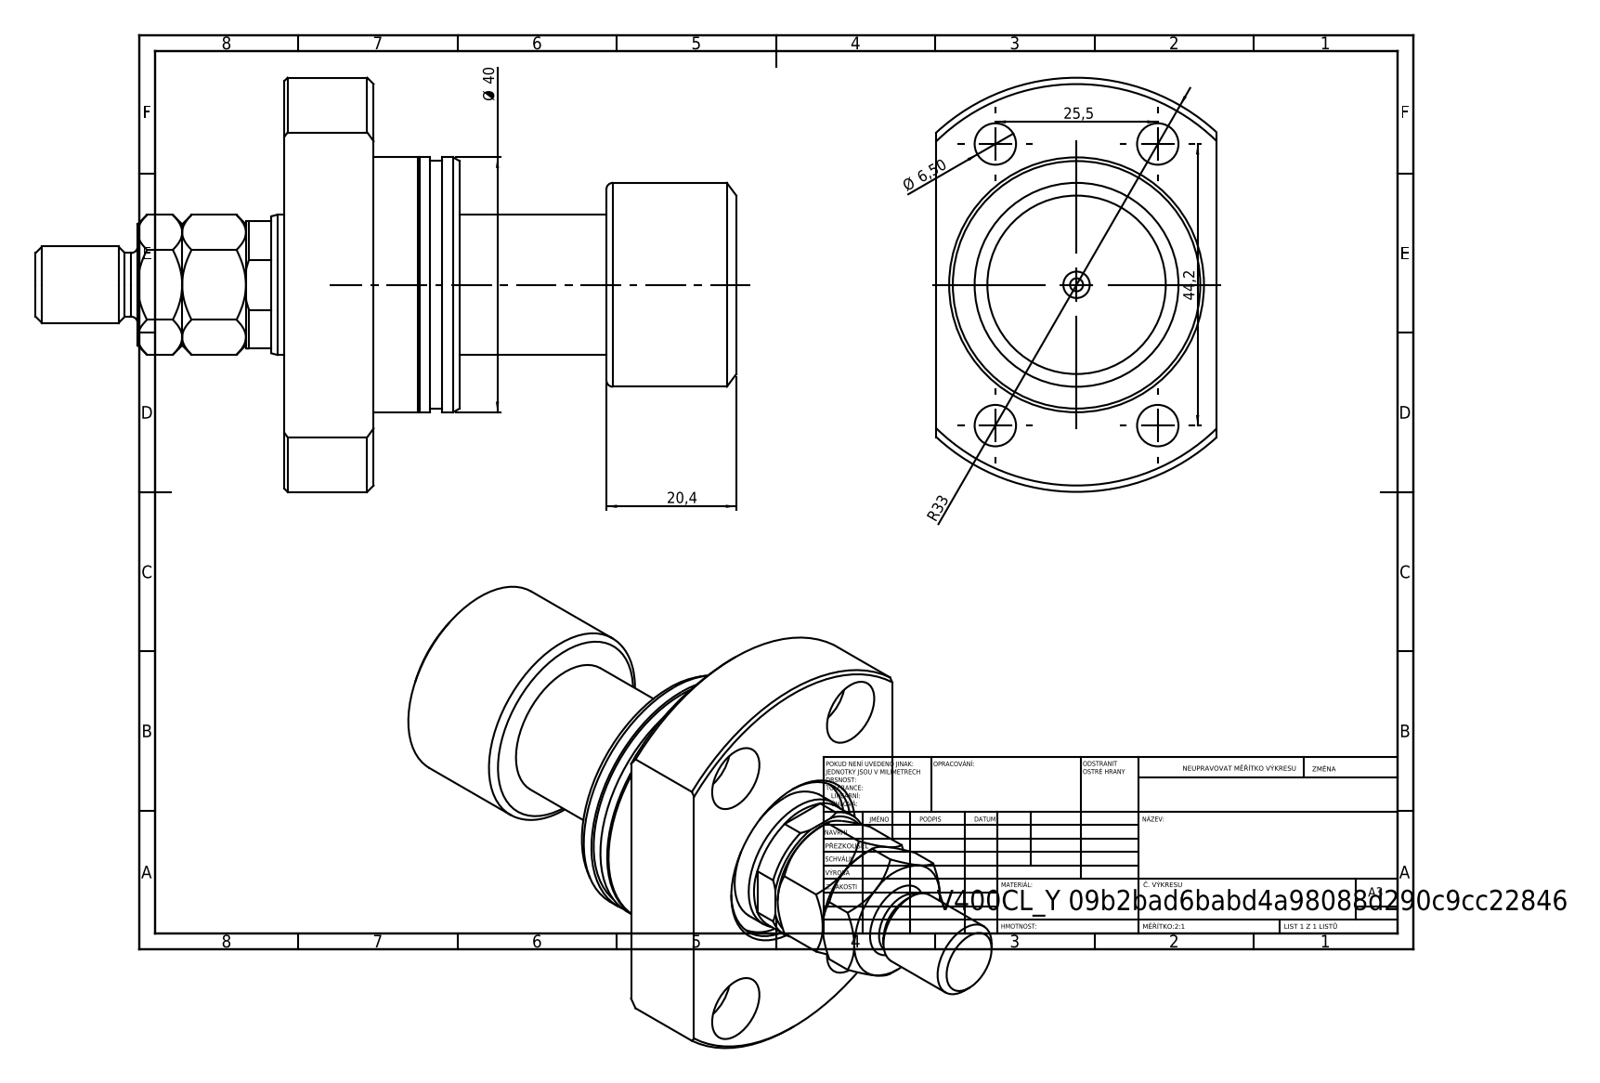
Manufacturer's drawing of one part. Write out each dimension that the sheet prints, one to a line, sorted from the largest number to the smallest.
44,2
Ø 40
R33
25,5
20,4
Ø 6,50
